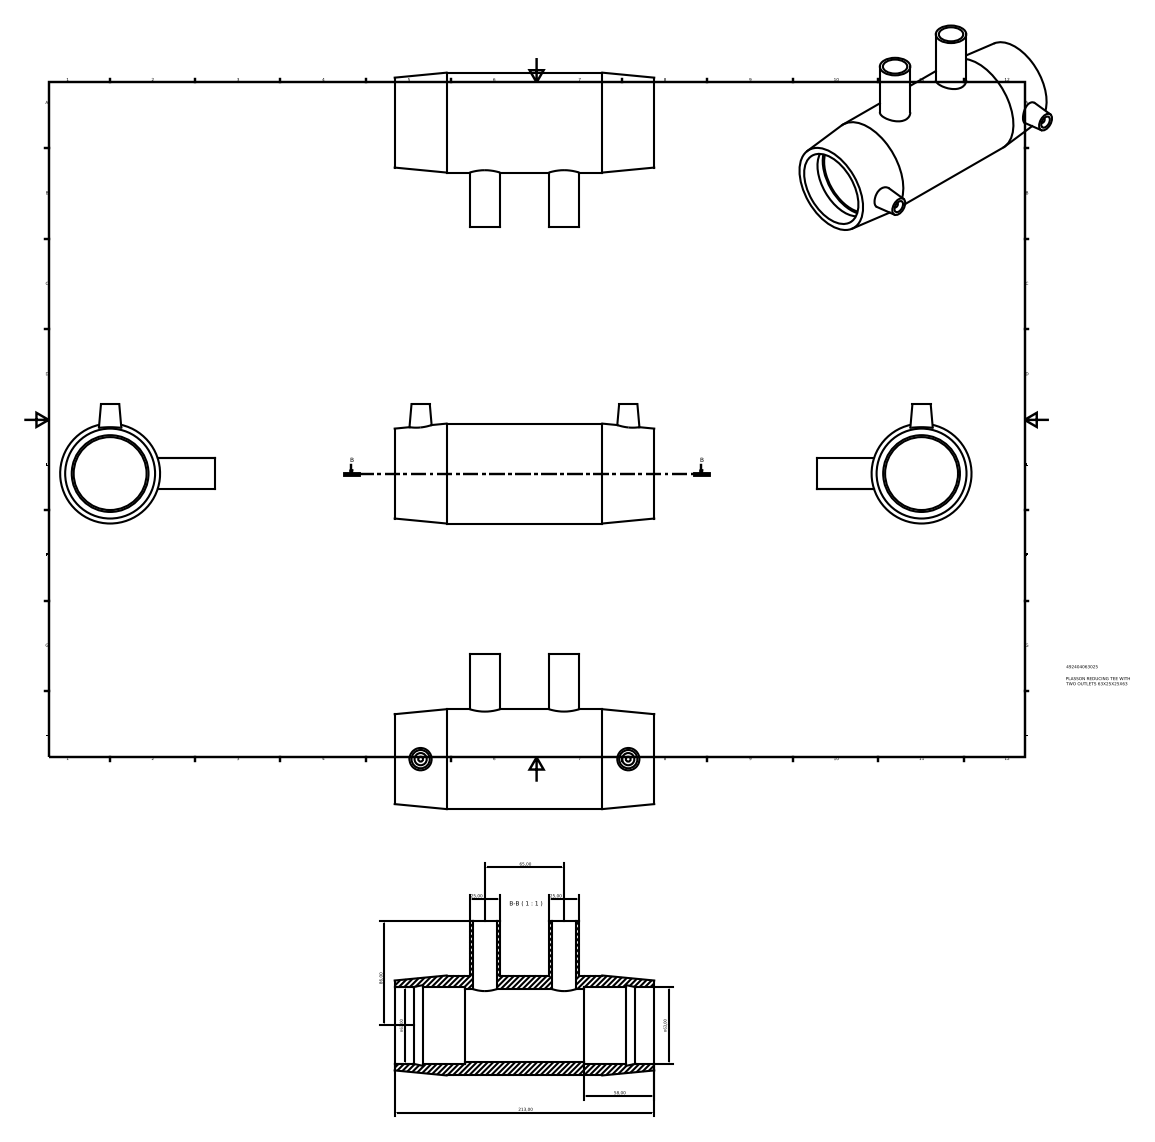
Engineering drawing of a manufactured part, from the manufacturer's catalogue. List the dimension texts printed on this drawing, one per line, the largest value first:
213,00
86,00
65,00
n63,00
n63,00
58,00
25,00
25,00
